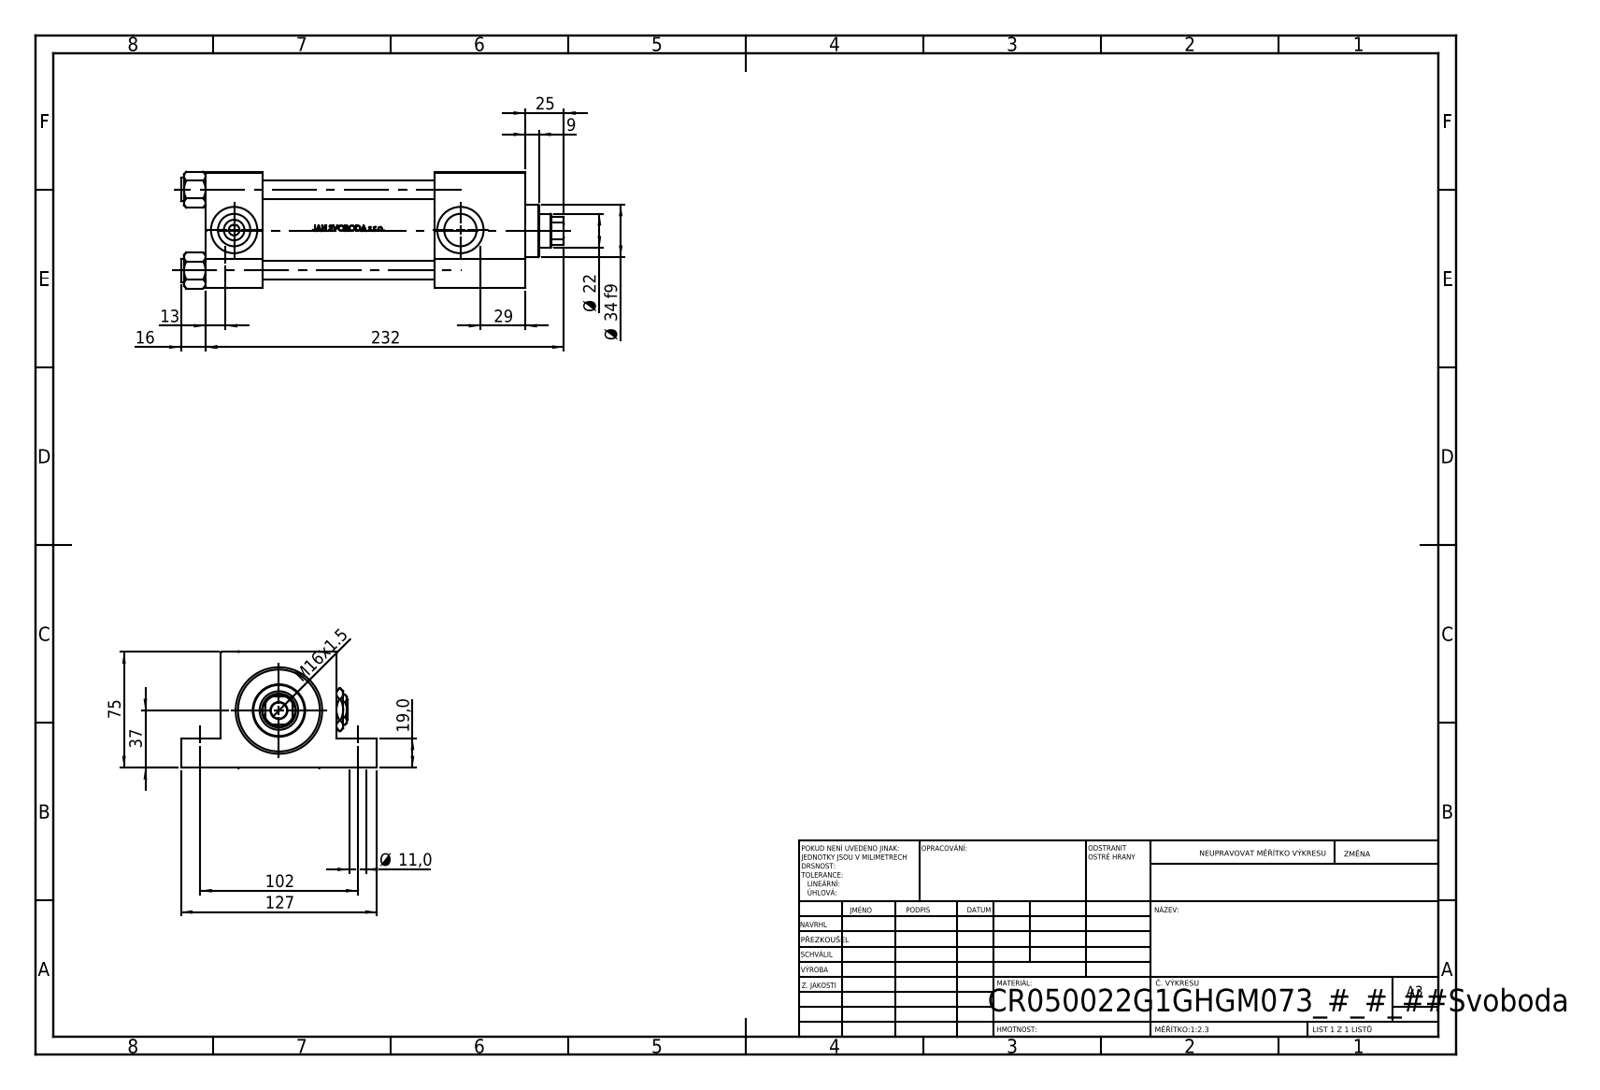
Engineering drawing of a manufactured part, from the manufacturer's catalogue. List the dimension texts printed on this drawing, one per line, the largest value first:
232
127
102
75
37
Ø 34 f9
29
25
Ø 22
19,0
16
M16x1.5
13
Ø 11,0
9
